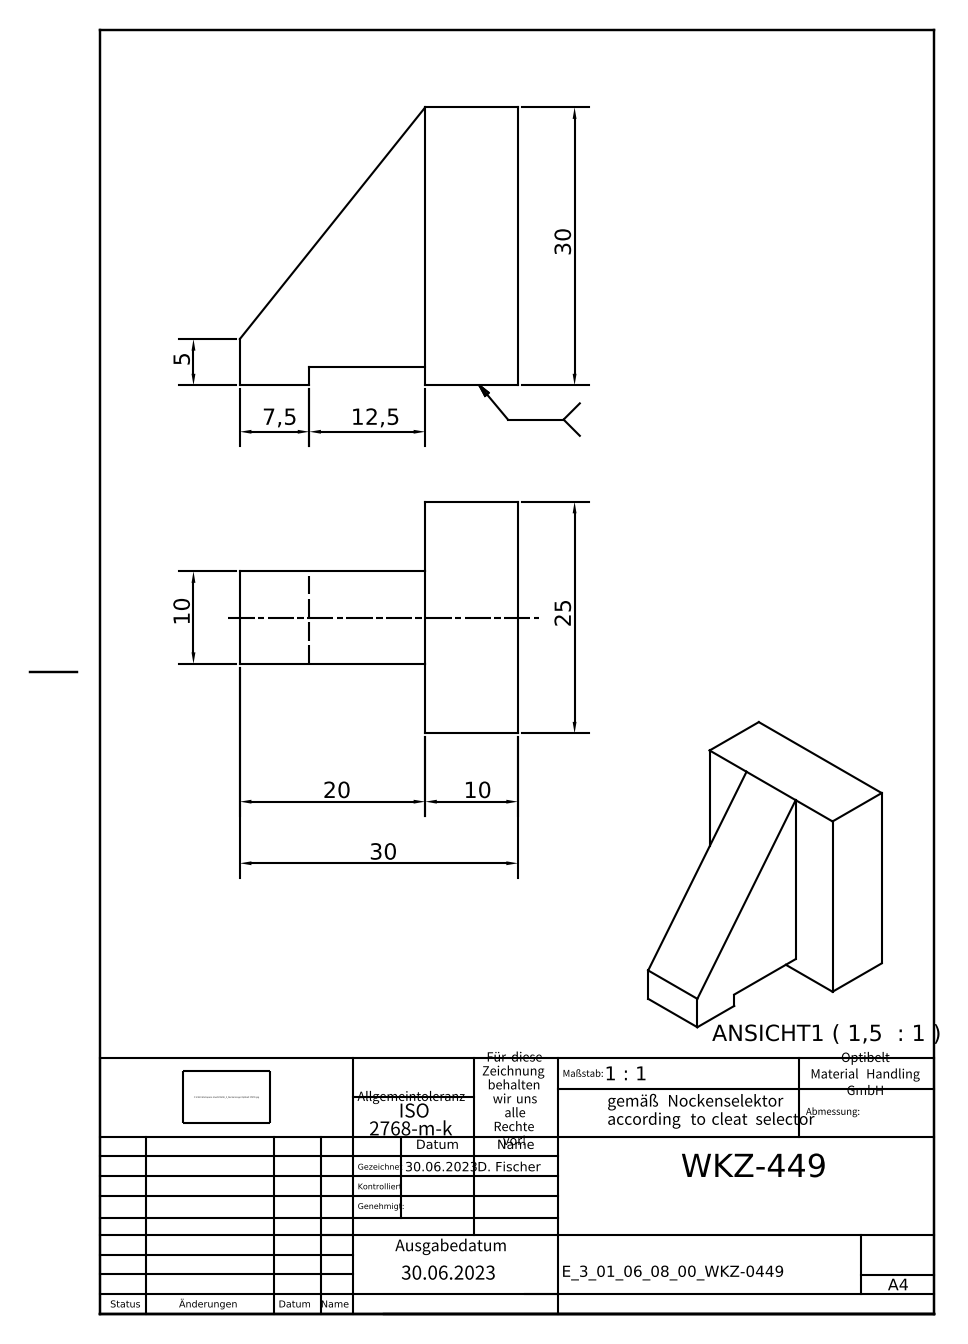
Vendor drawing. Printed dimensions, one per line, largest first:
30
30
25
20
12,5
10
10
7,5
5
